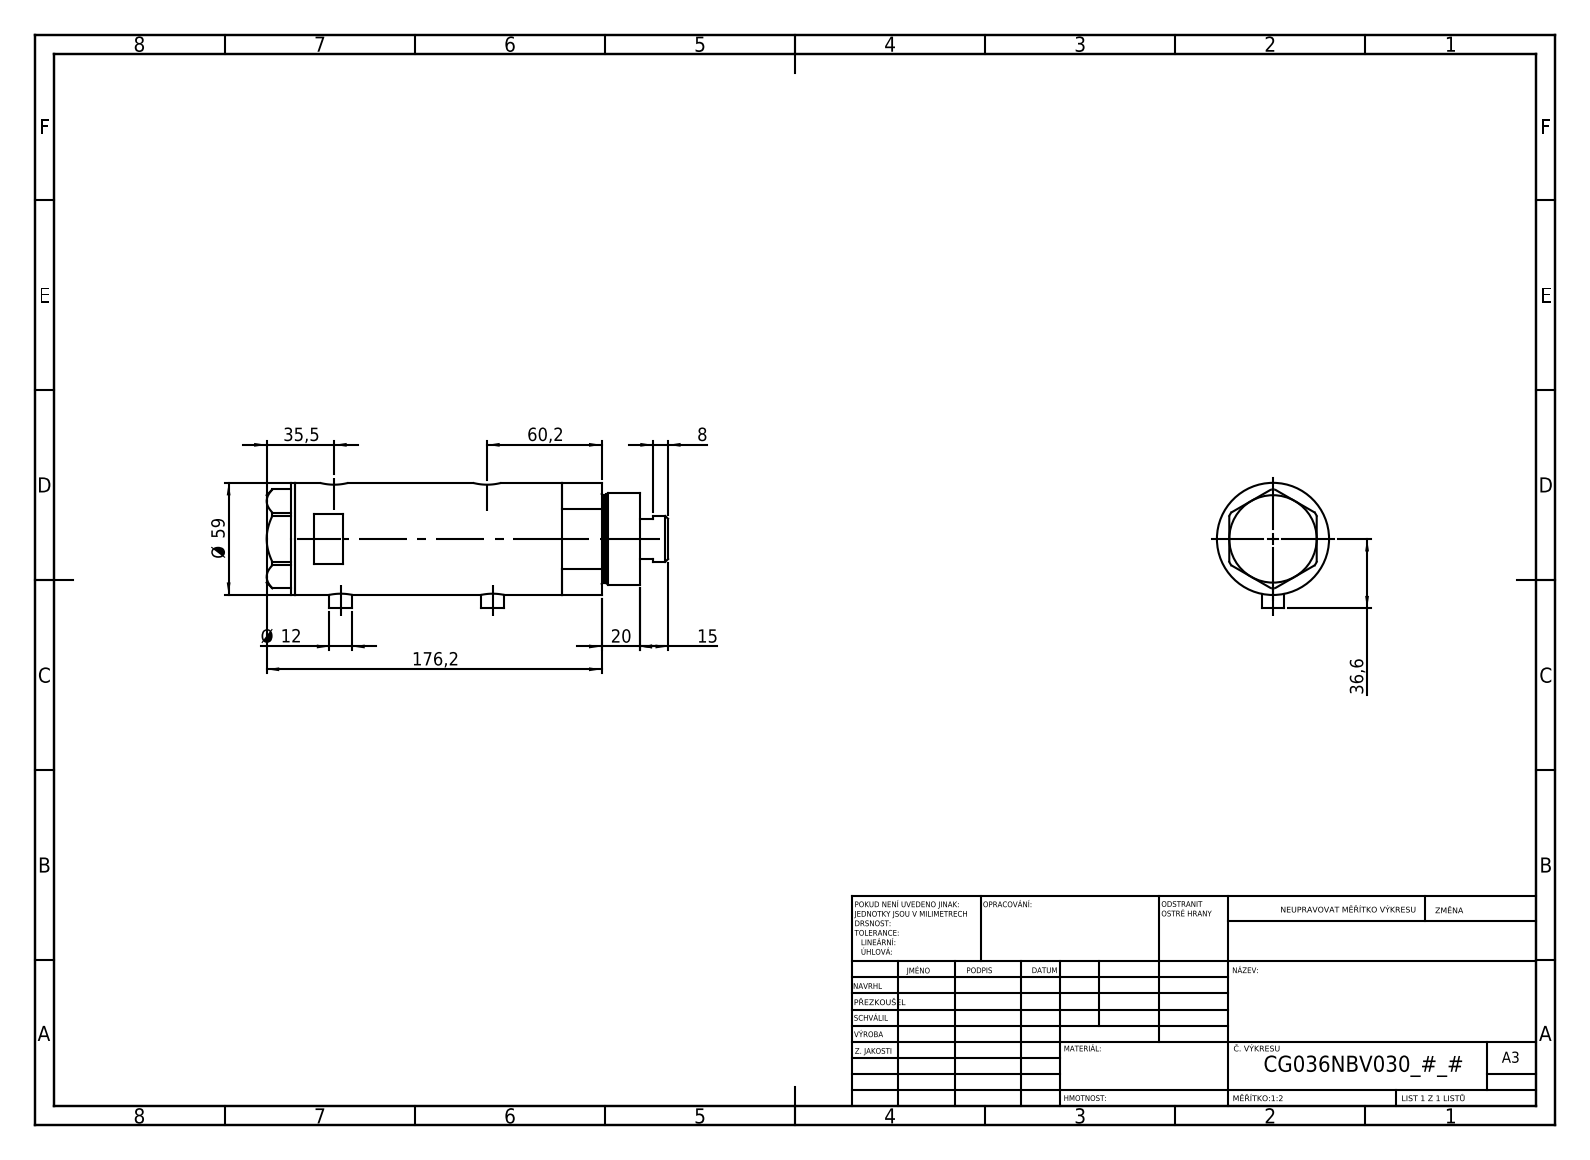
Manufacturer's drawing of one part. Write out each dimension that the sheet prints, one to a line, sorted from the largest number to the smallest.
176,2
60,2
Ø 59
36,6
35,5
20
15
Ø 12
8
